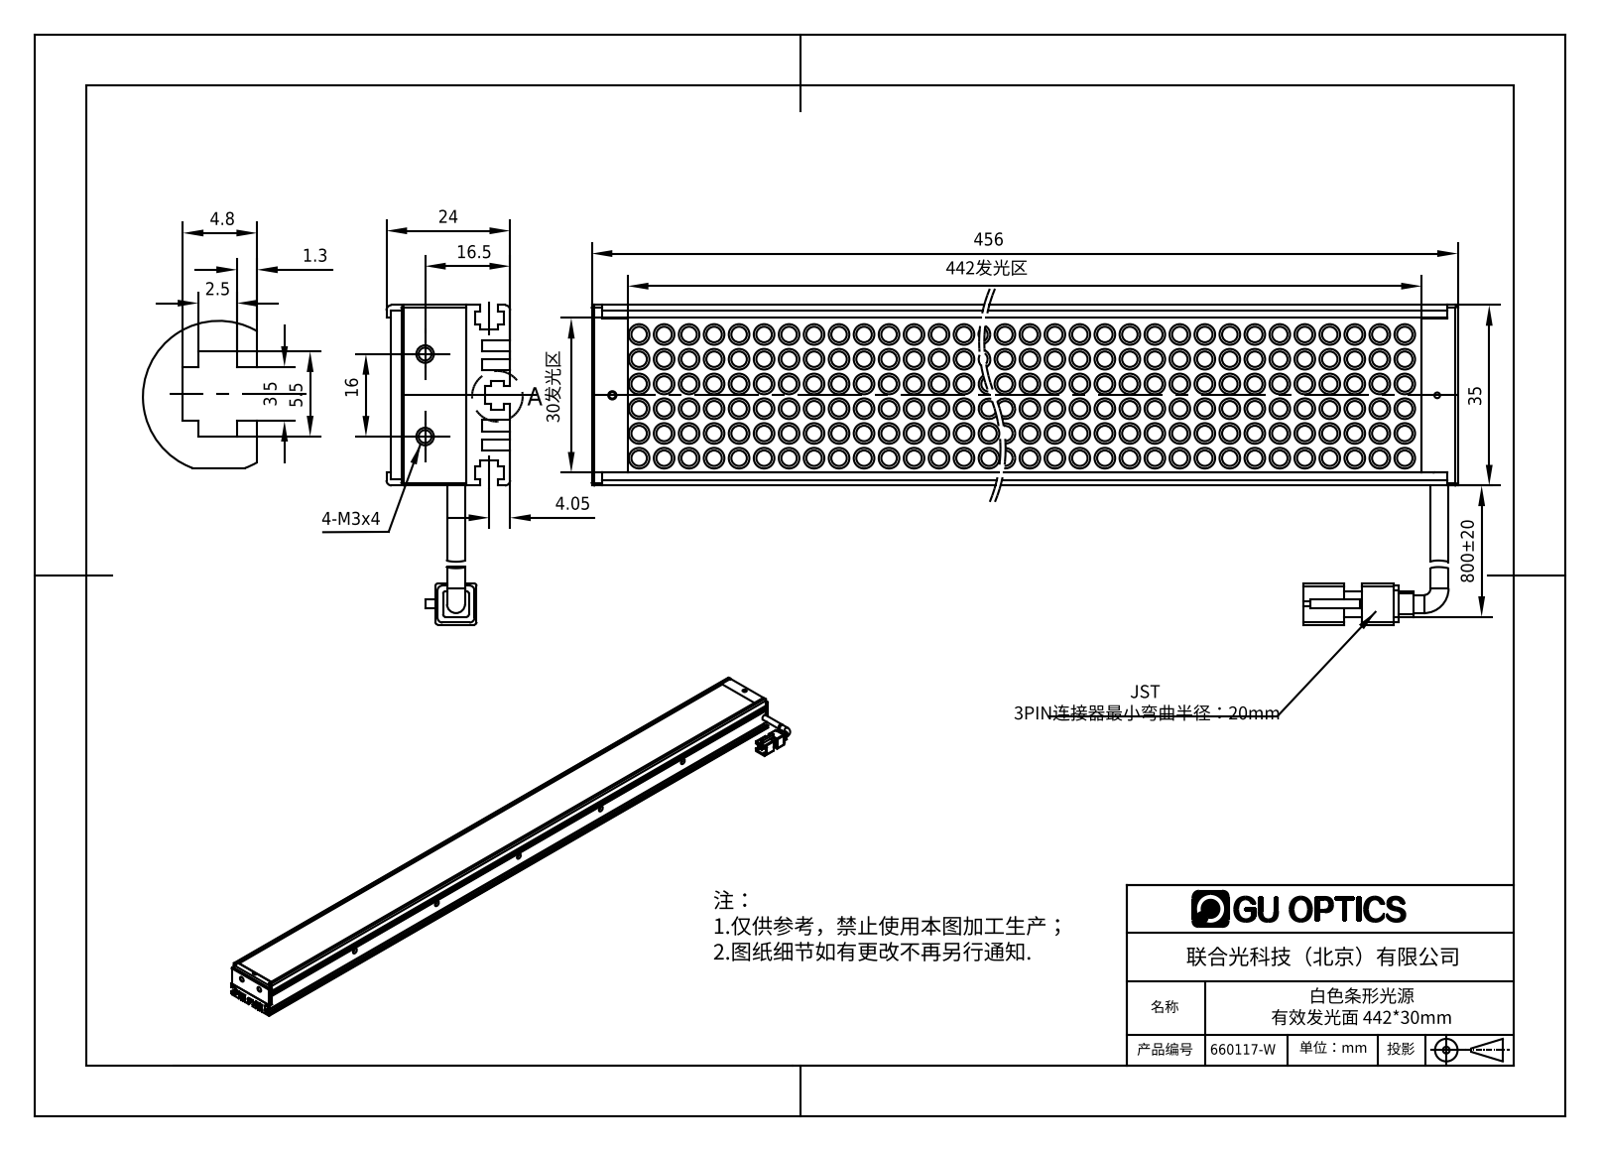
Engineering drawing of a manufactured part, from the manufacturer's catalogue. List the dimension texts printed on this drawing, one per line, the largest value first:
800±20
456
442发光区
35
30发光区
24
16.5
16
5.5
4.8
4.05
3.5
2.5
1.3
